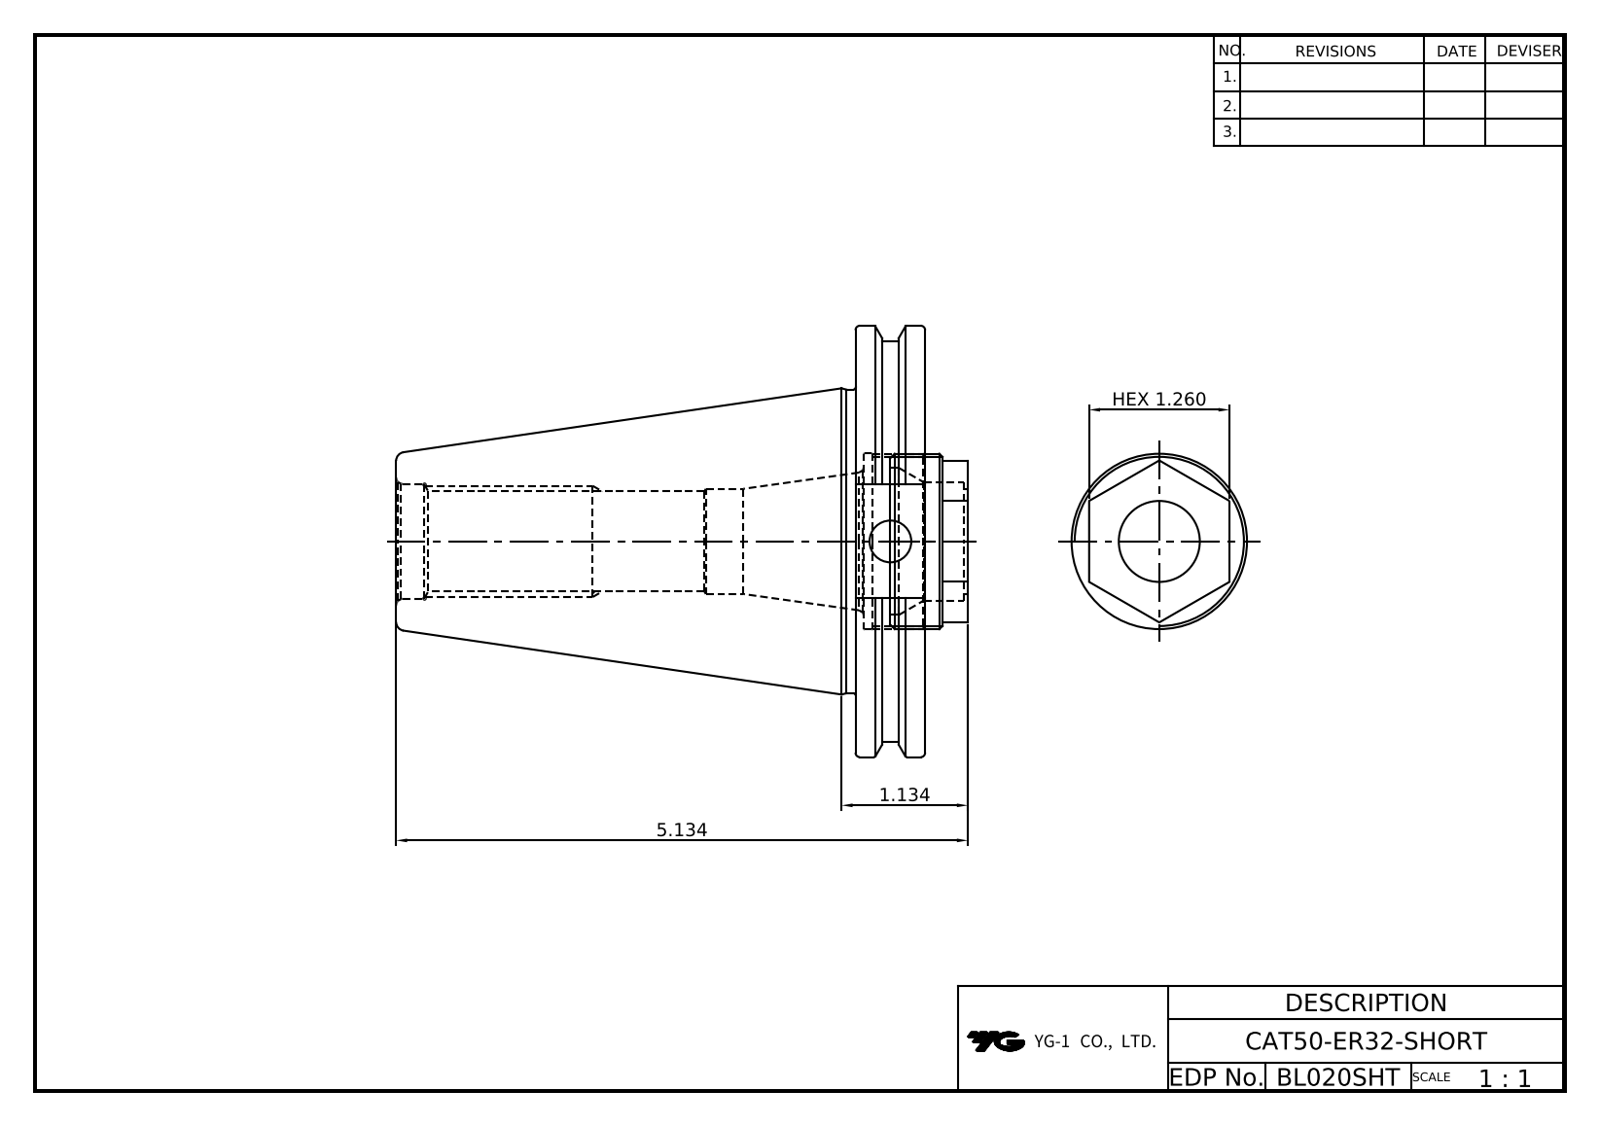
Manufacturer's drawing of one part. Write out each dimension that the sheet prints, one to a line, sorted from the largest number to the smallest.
5.134
HEX 1.260
1.134
